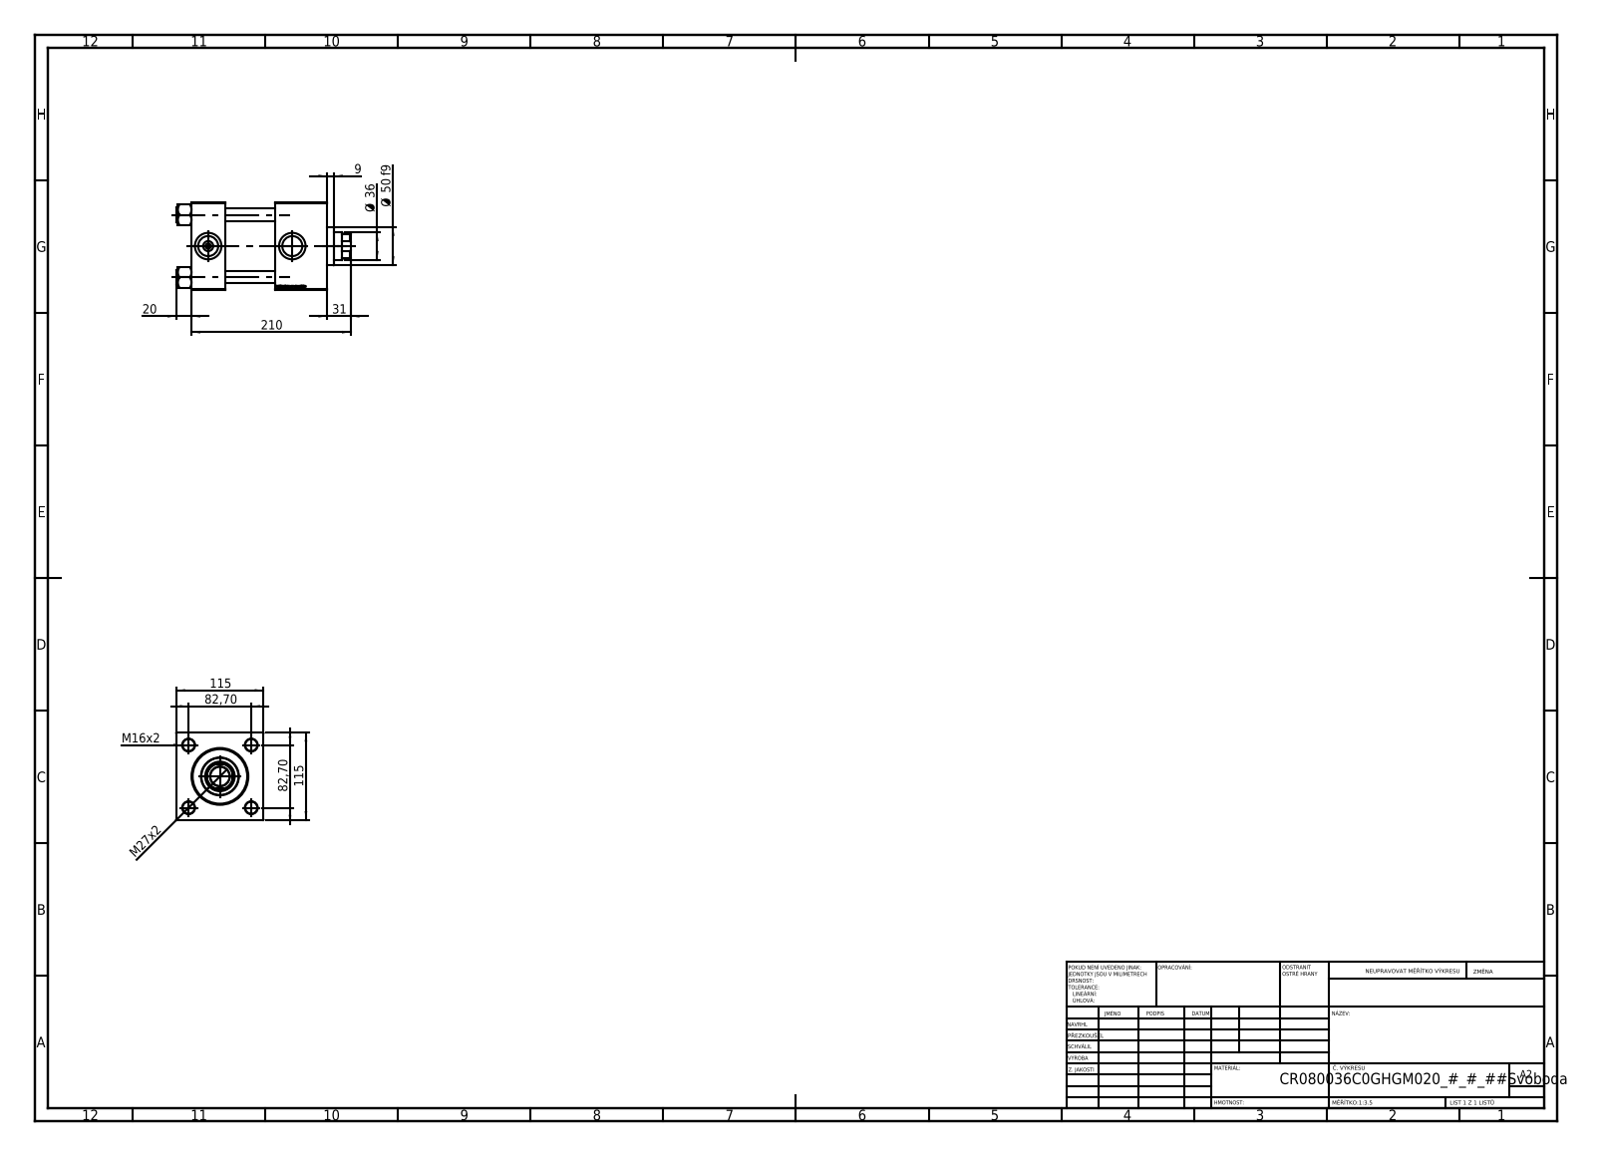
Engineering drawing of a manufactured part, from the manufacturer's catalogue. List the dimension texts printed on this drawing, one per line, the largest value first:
210
115
115
82,70
82,70
Ø 50 f9
Ø 36
31
M27x2
20
M16x2
9
